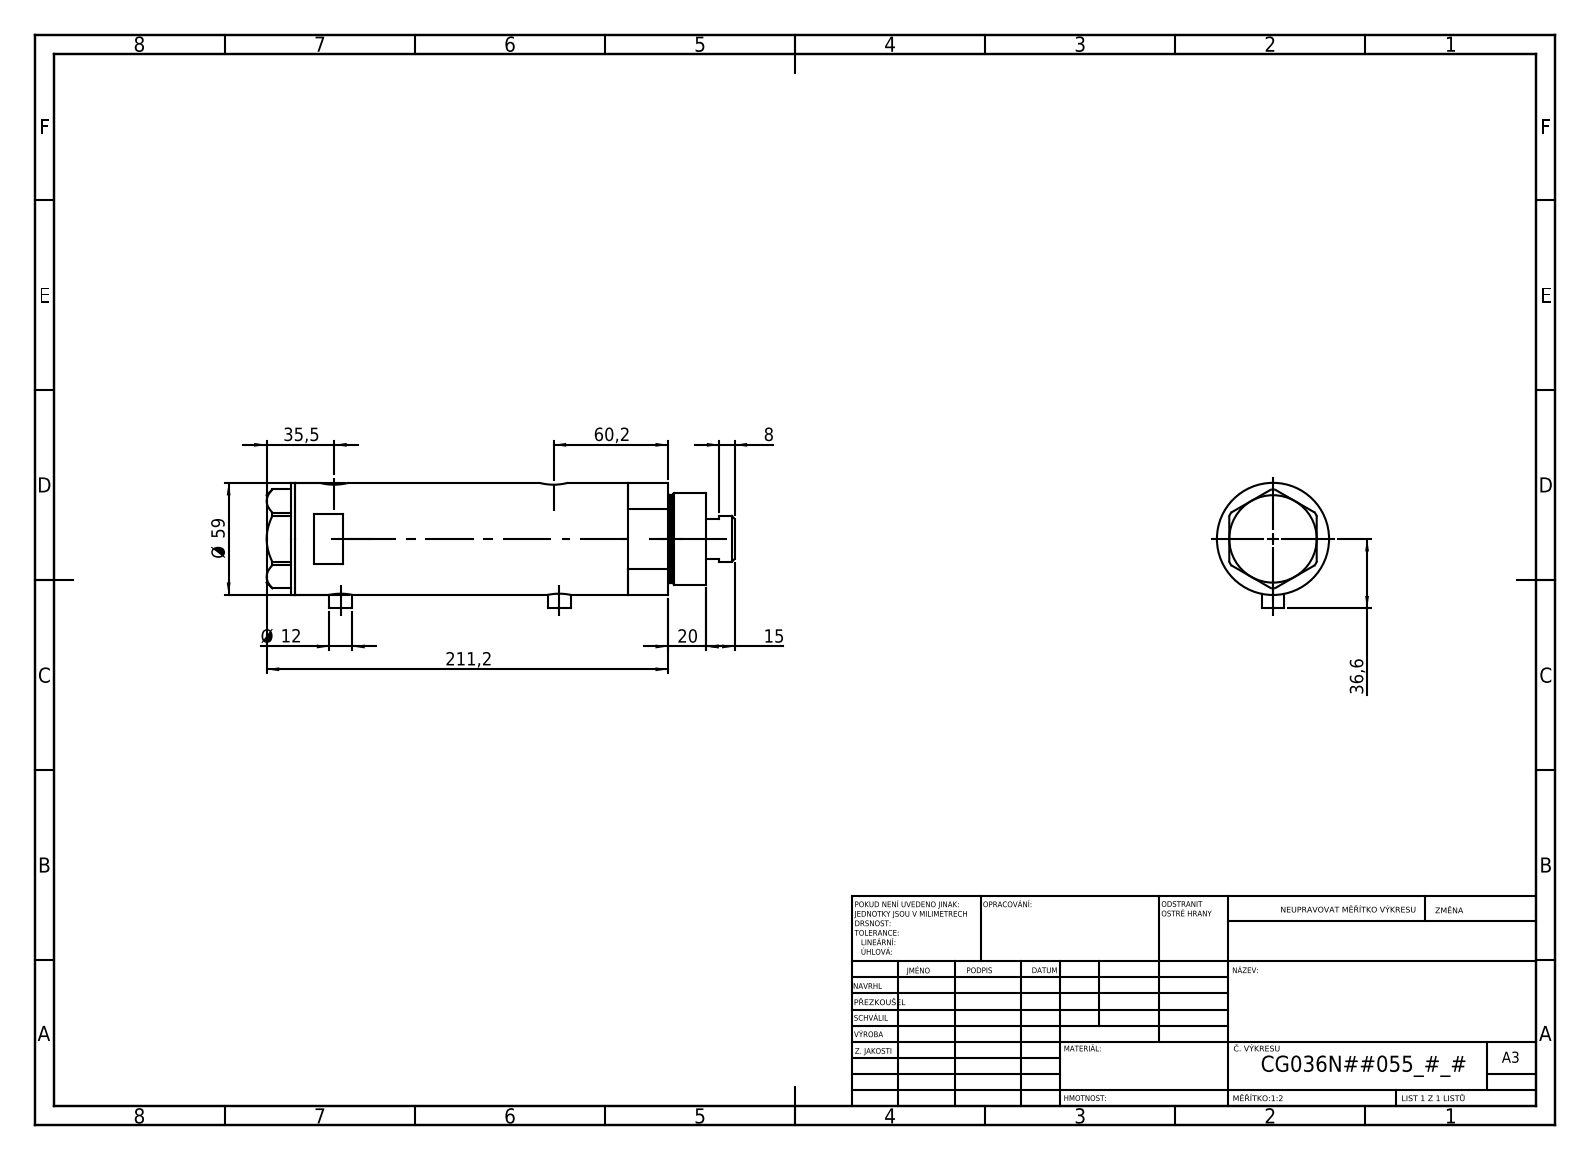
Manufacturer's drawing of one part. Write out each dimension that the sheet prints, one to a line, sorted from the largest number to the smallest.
211,2
60,2
Ø 59
36,6
35,5
20
15
Ø 12
8
